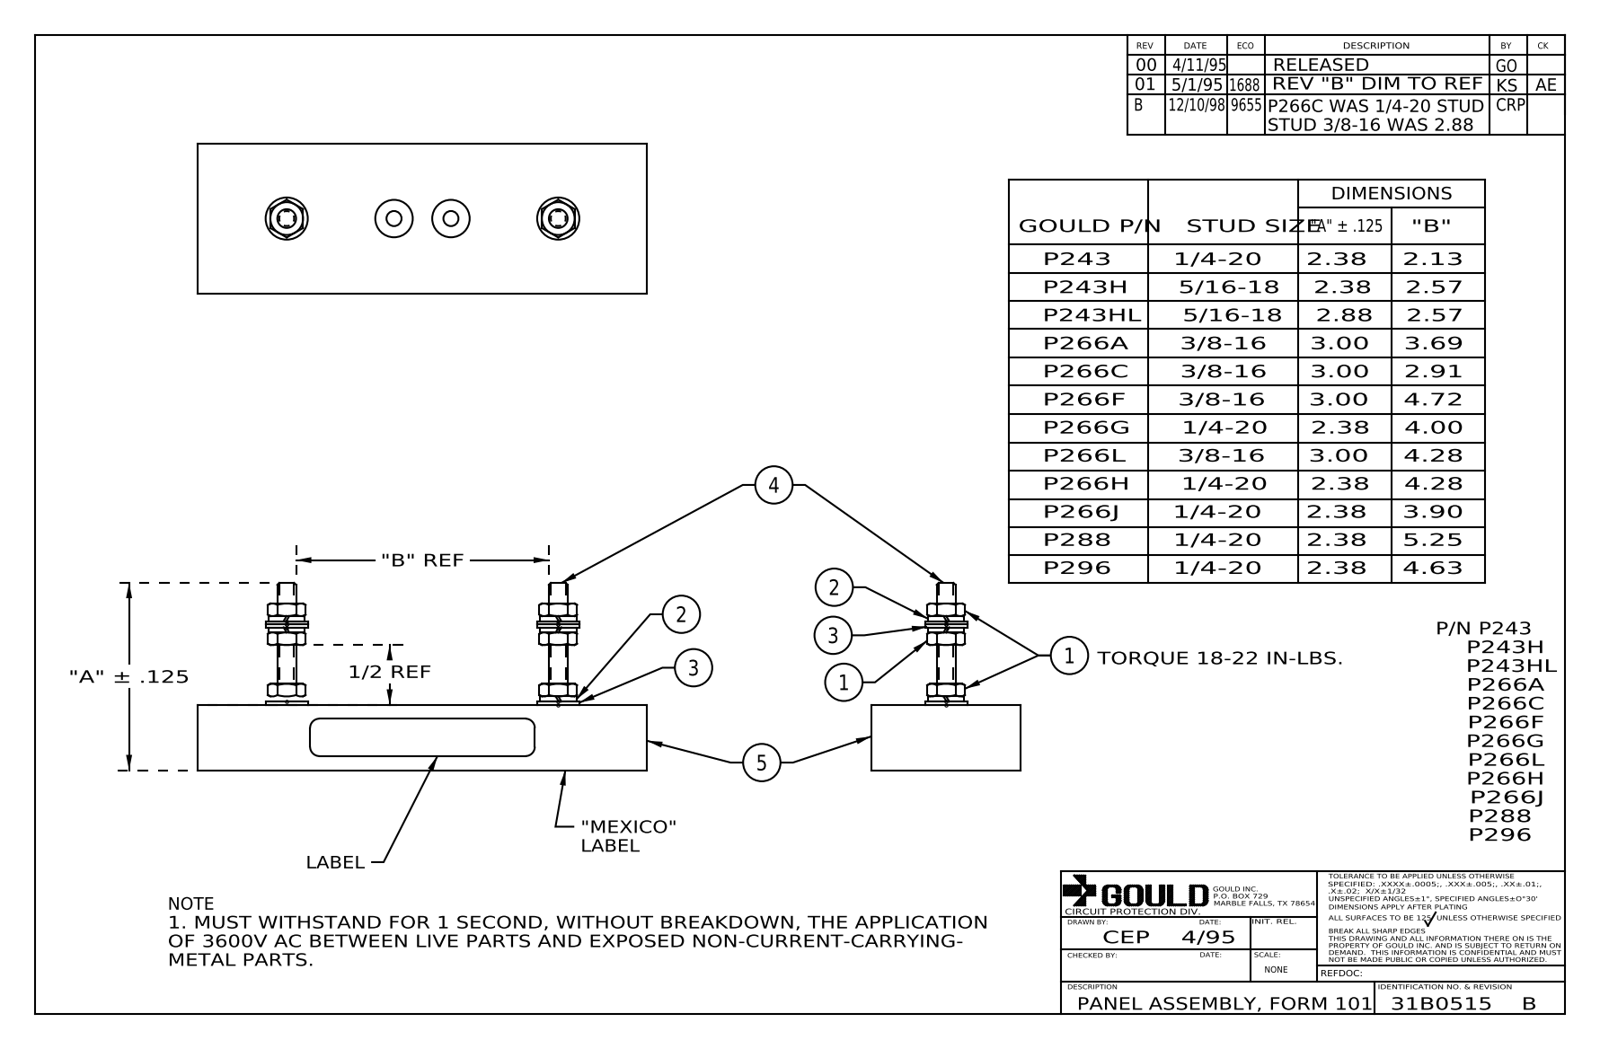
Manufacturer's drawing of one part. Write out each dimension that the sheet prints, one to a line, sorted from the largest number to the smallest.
1/2 REF
"A" ± .125
"B" REF
